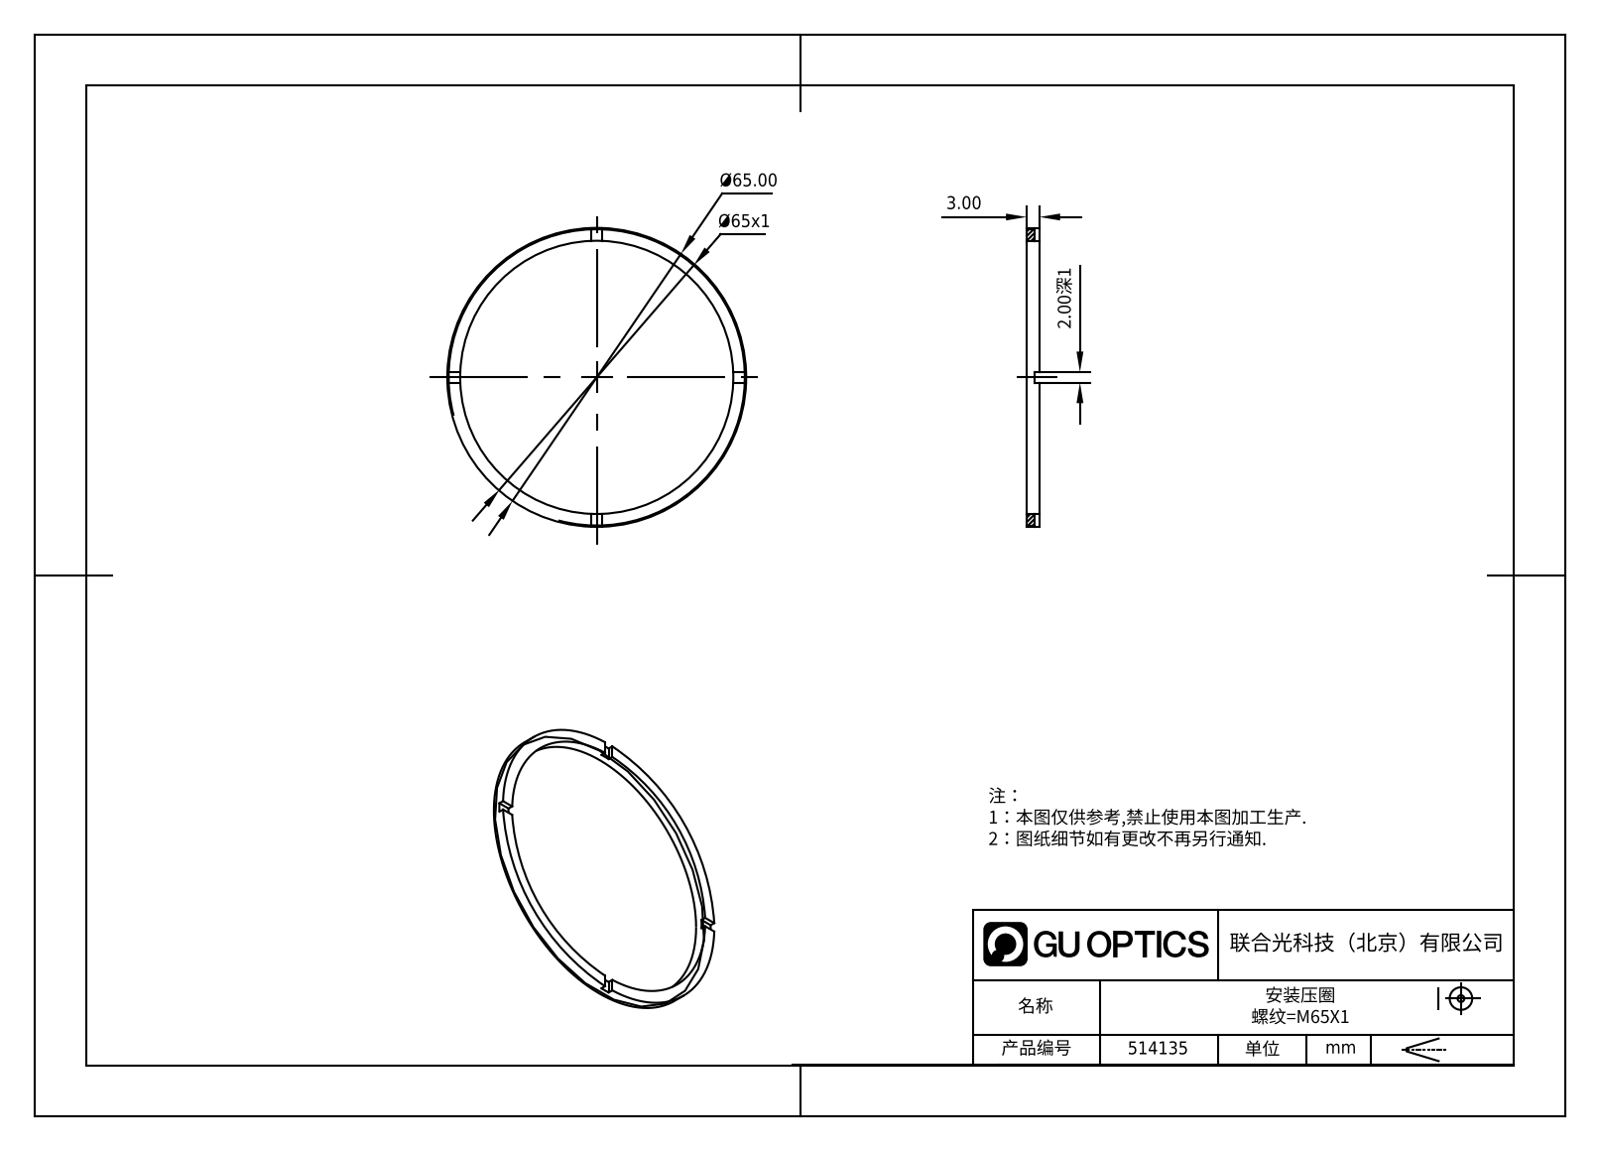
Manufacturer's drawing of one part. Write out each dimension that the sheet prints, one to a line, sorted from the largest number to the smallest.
Ø65.00
Ø65x1
3.00
2.00深1
